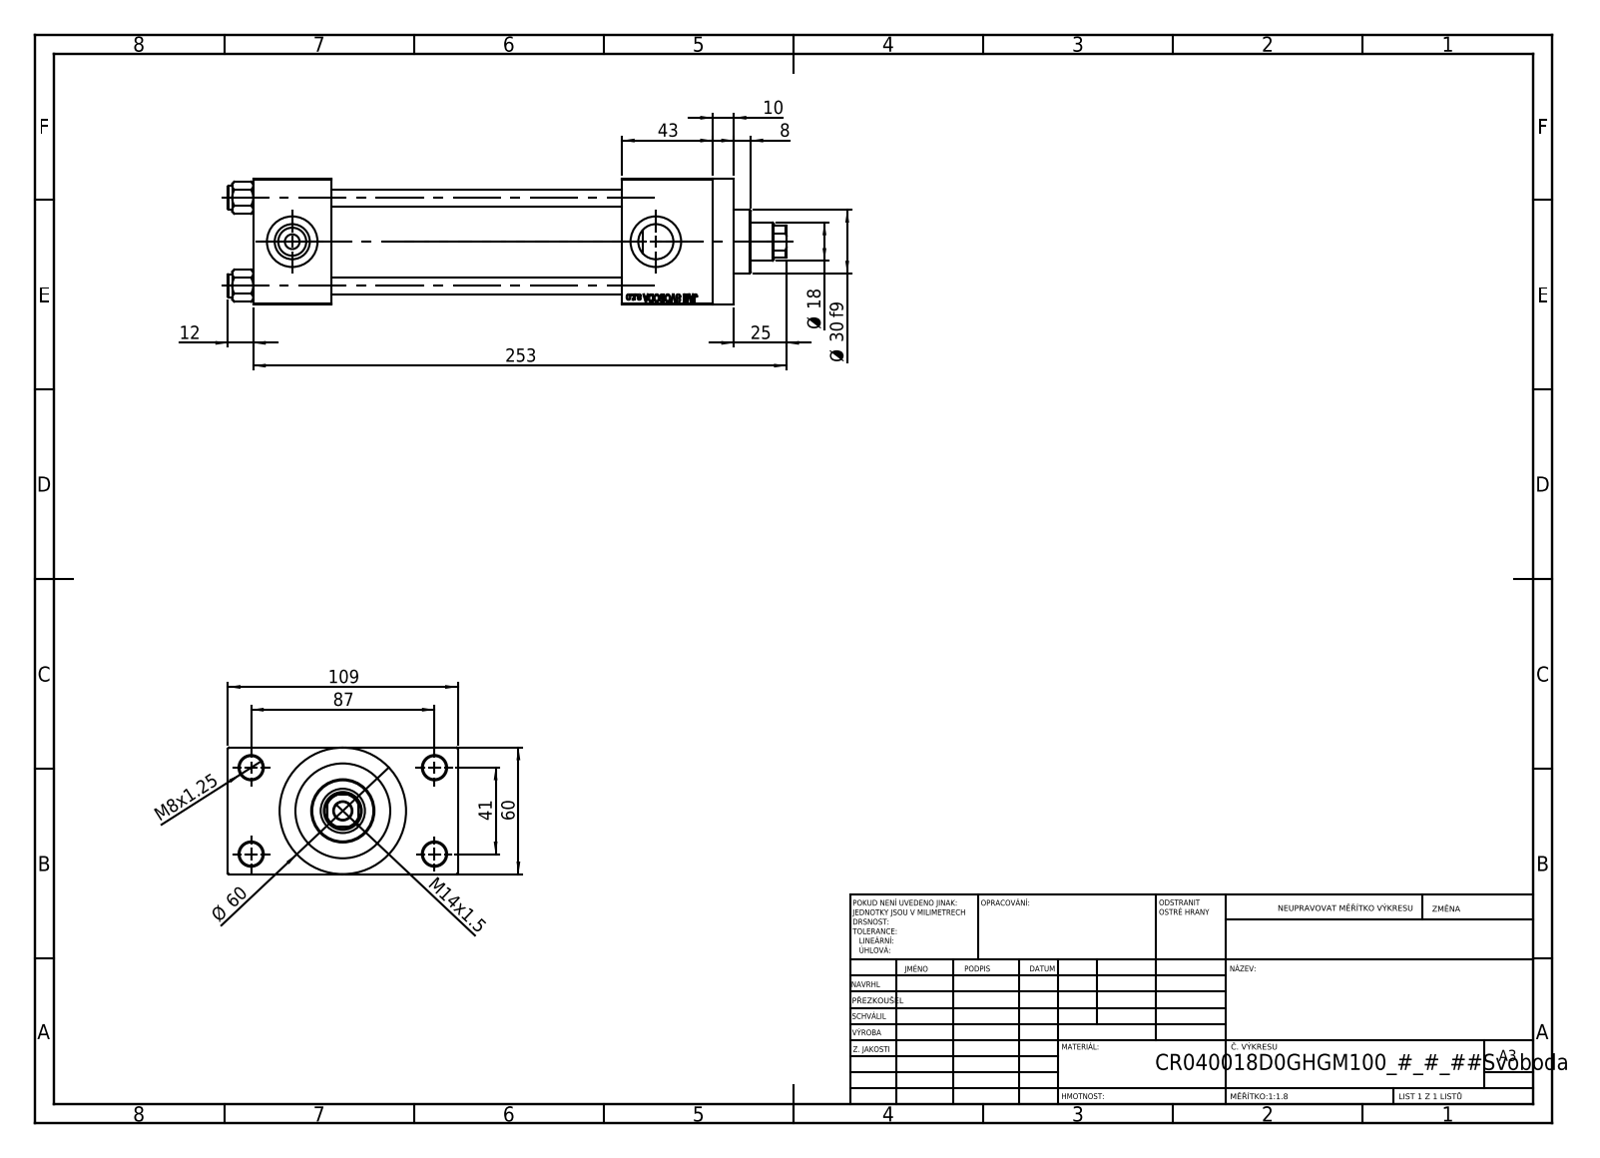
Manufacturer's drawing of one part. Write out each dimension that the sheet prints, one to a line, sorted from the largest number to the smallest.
253
109
87
Ø 60
60
43
41
Ø 30 f9
25
Ø 18
M14x1.5
12
10
8
M8x1.25
